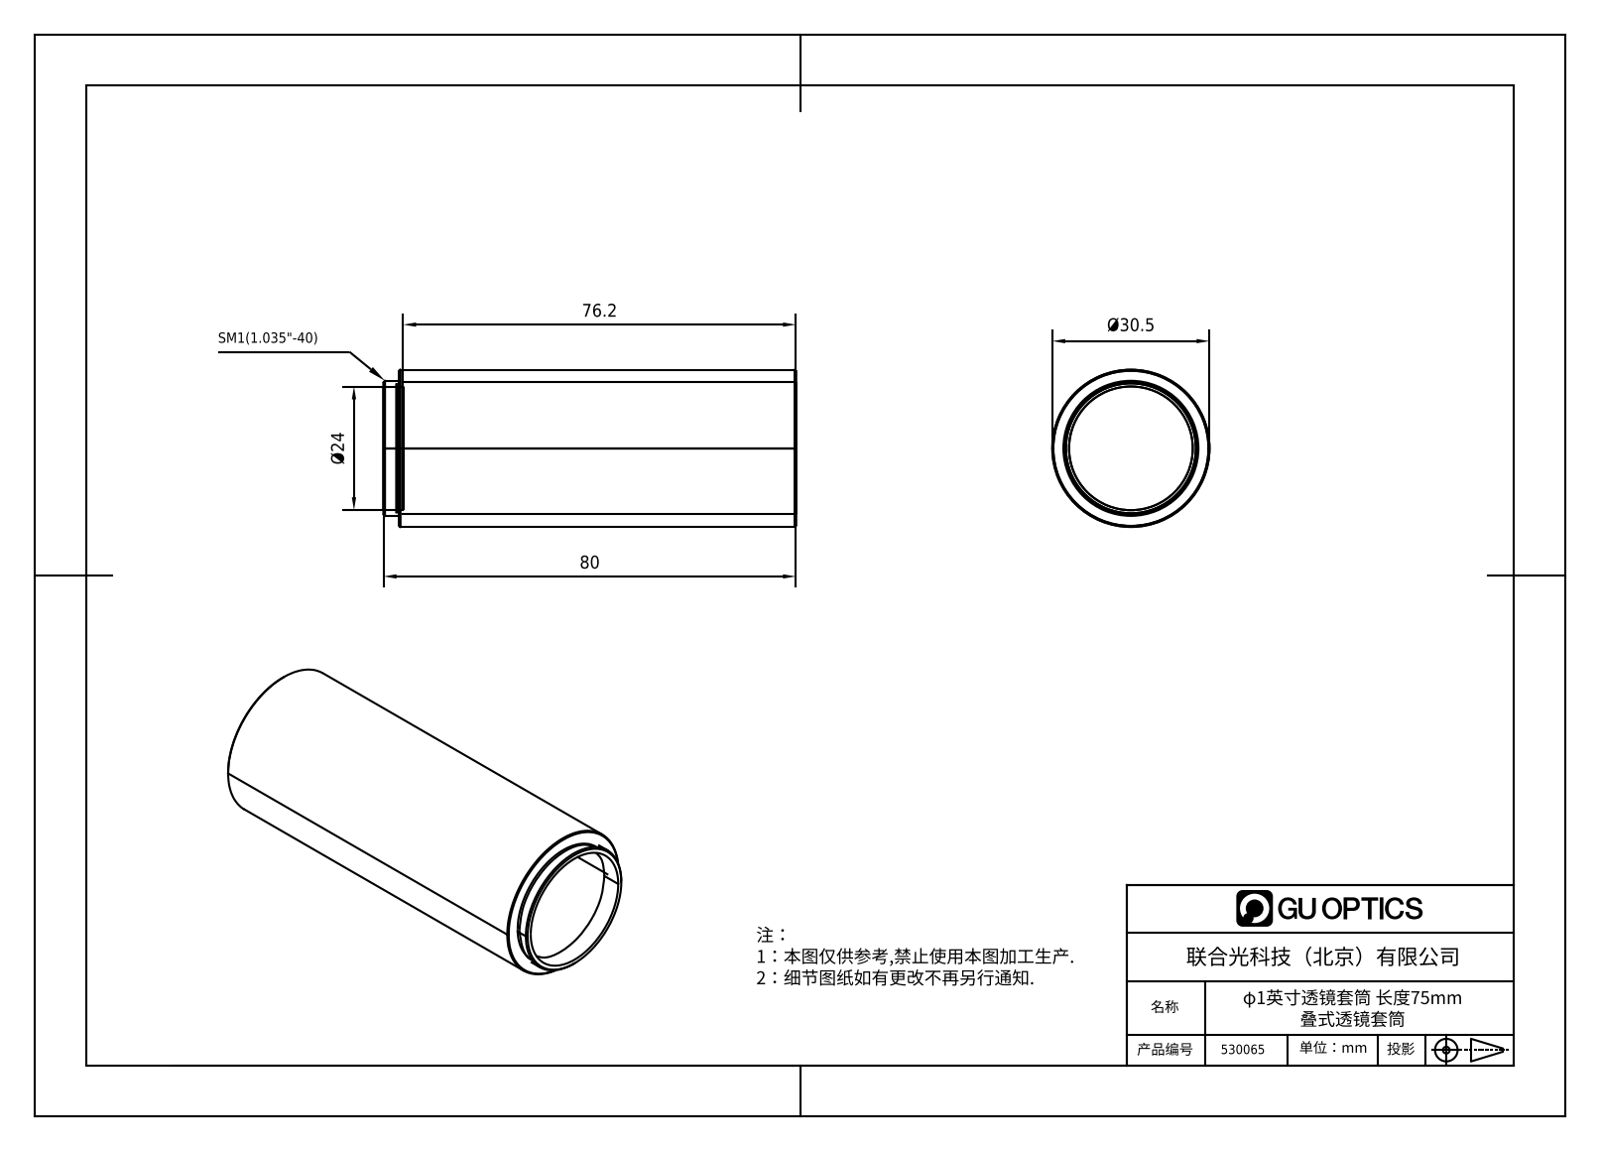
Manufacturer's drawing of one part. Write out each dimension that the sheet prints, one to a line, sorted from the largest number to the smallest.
80
76.2
Ø30.5
Ø24
